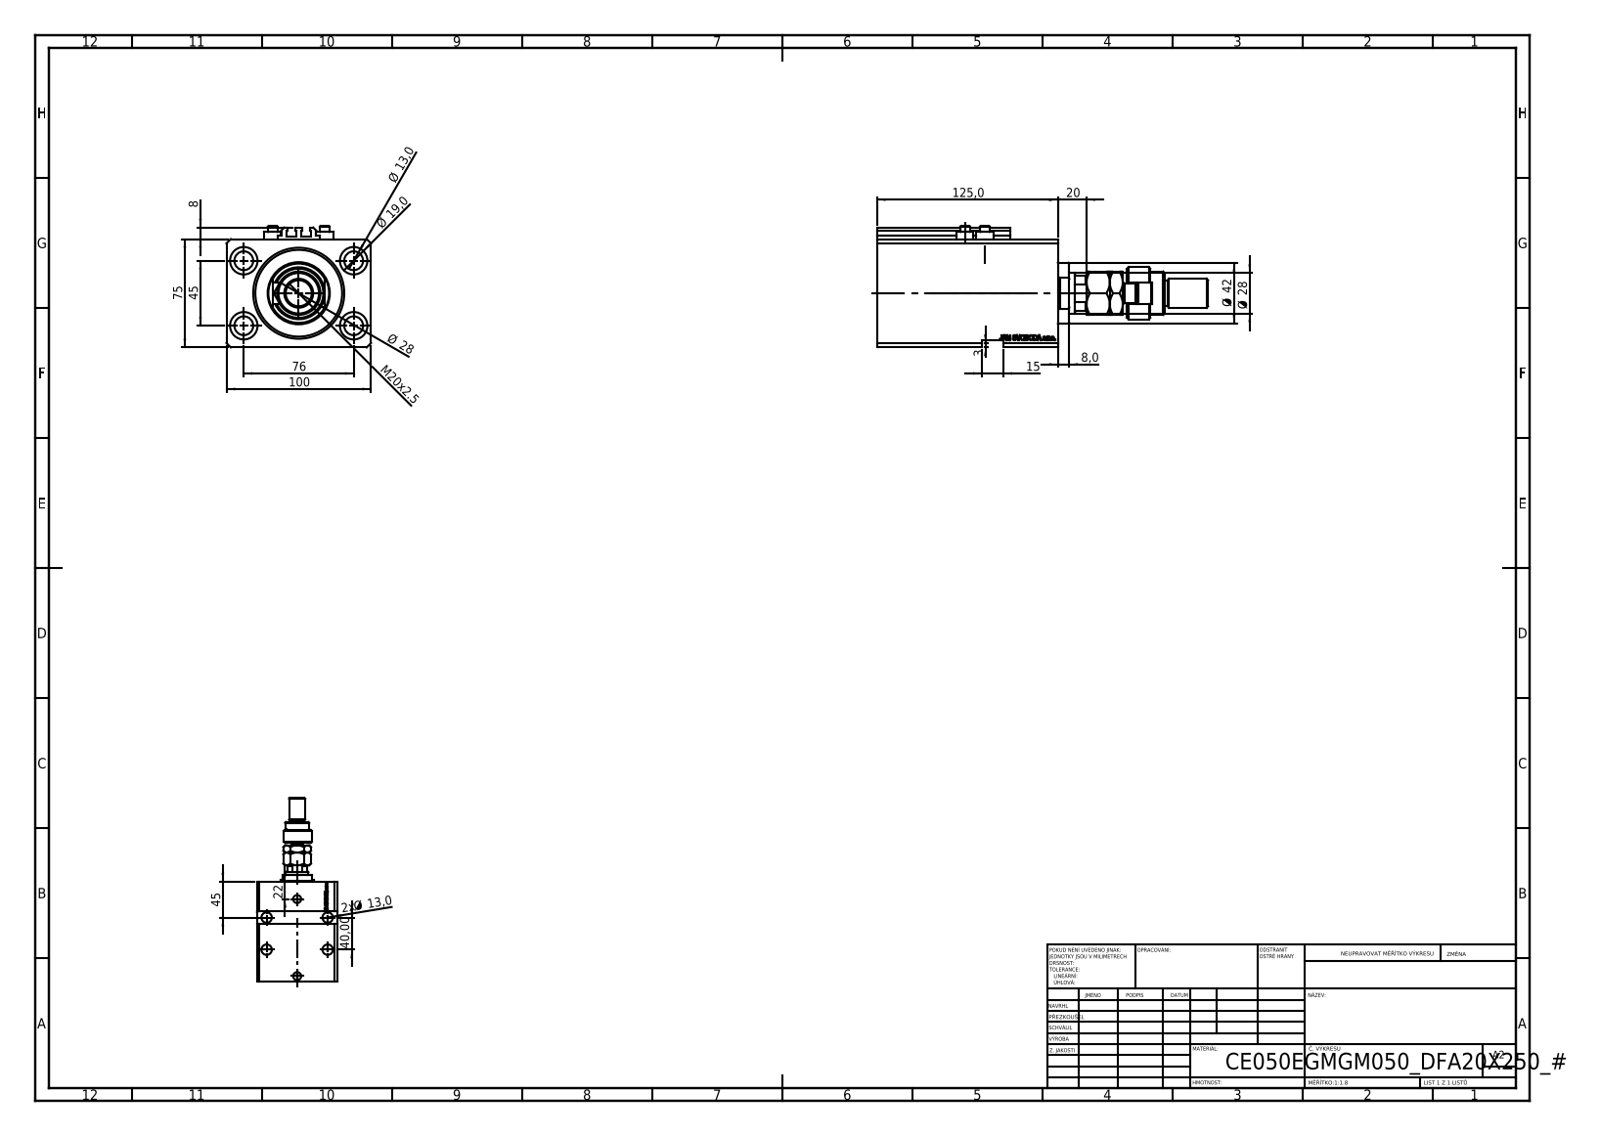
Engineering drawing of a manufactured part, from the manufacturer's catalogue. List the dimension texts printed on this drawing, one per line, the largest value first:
125,0
100
76
75
45
45
Ø 42
40,00
Ø 28
Ø 28
22
M20x2.5
20
Ø 19,0
15
Ø 13,0
2x Ø 13,0
8
8,0
3
